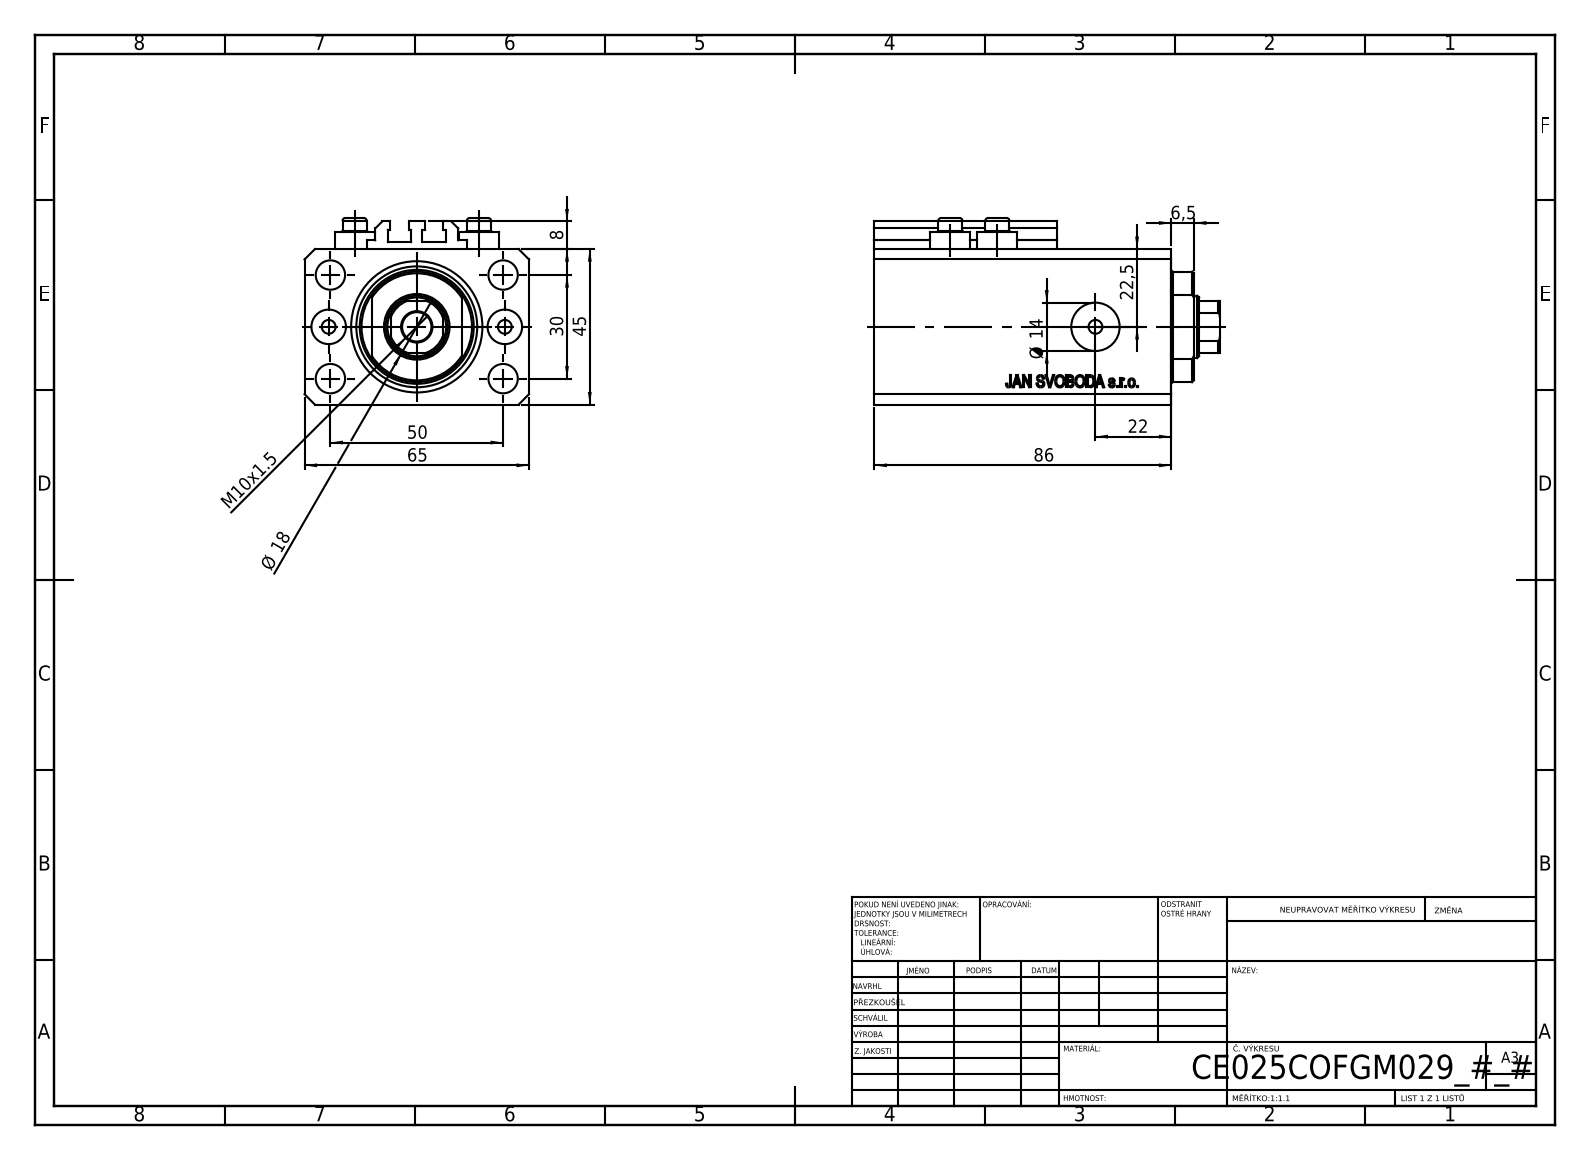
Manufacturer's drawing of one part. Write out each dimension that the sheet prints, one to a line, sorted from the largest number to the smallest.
86
65
50
45
30
22,5
22
Ø 18
Ø 14
M10x1.5
8
6,5
